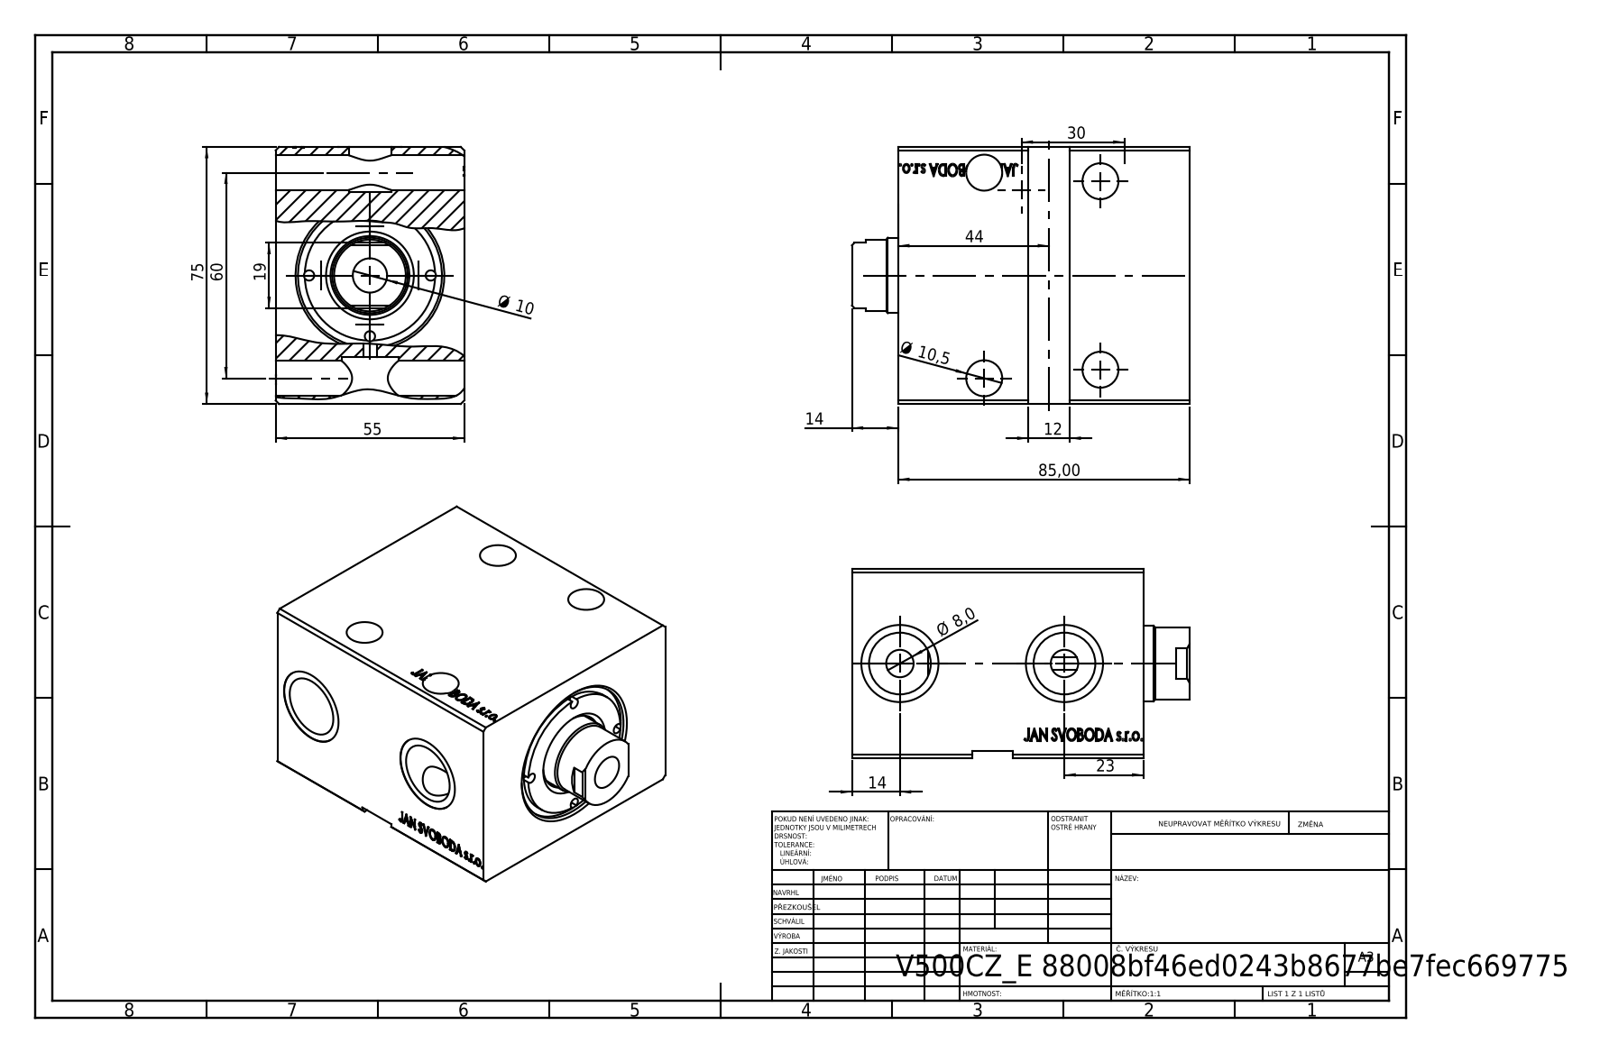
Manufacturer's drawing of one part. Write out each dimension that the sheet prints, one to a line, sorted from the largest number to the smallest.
85,00
75
60
55
44
30
23
19
14
14
12
Ø 10,5
Ø 10
Ø 8,0
